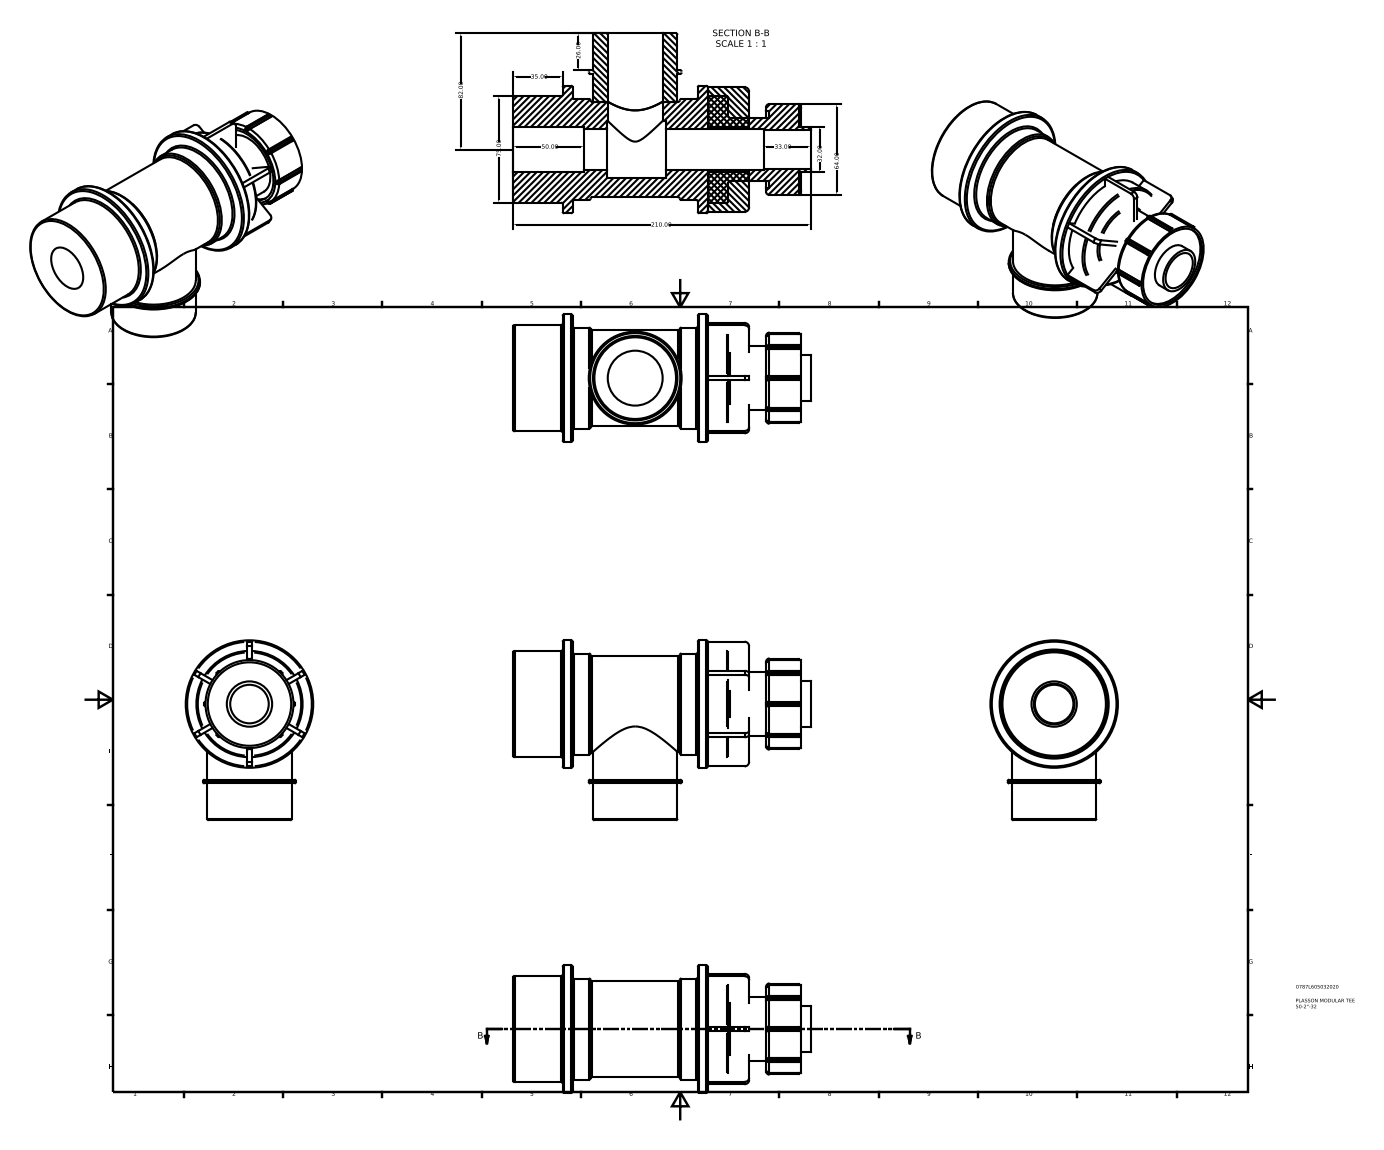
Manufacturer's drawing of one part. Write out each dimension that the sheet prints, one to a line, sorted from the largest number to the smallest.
210.00
82.00
75.00
64.00
50.00
35.00
33.00
32.00
26.00
